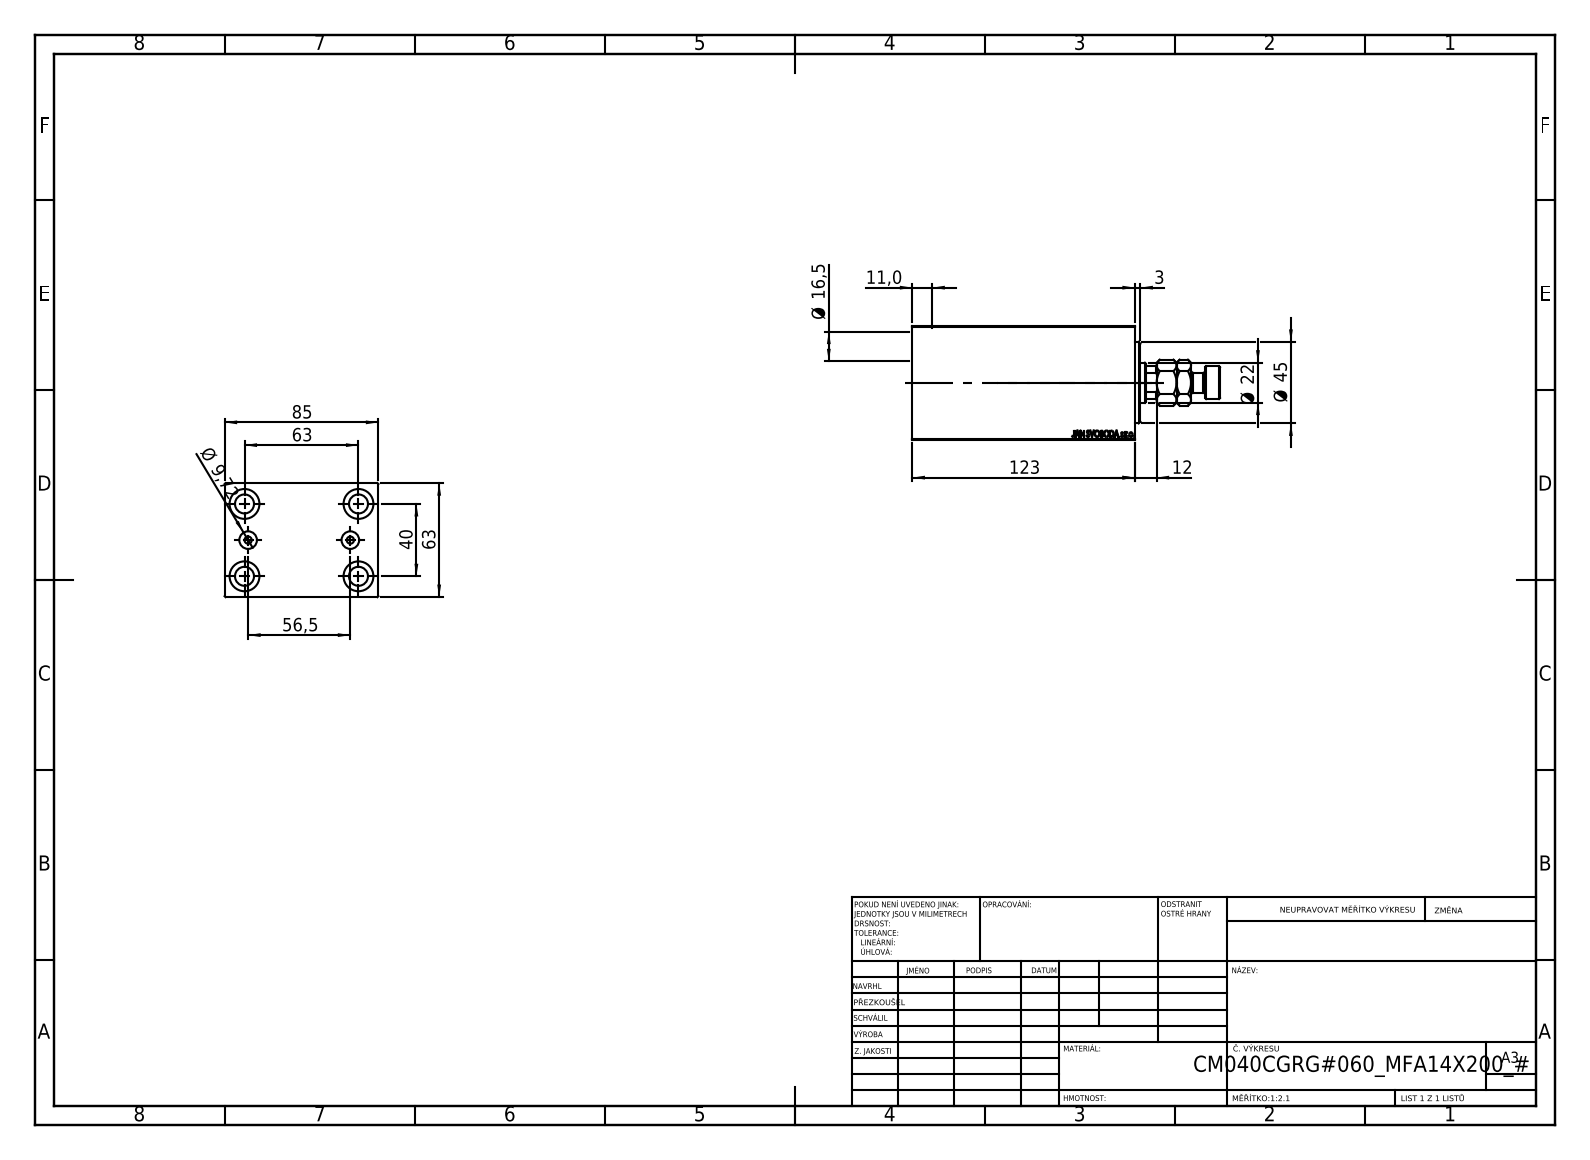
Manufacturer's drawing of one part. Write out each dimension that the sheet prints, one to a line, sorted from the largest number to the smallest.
123
85
63
63
56,5
Ø 45
40
Ø 22
Ø 16,5
12
11,0
Ø 9,72
3
